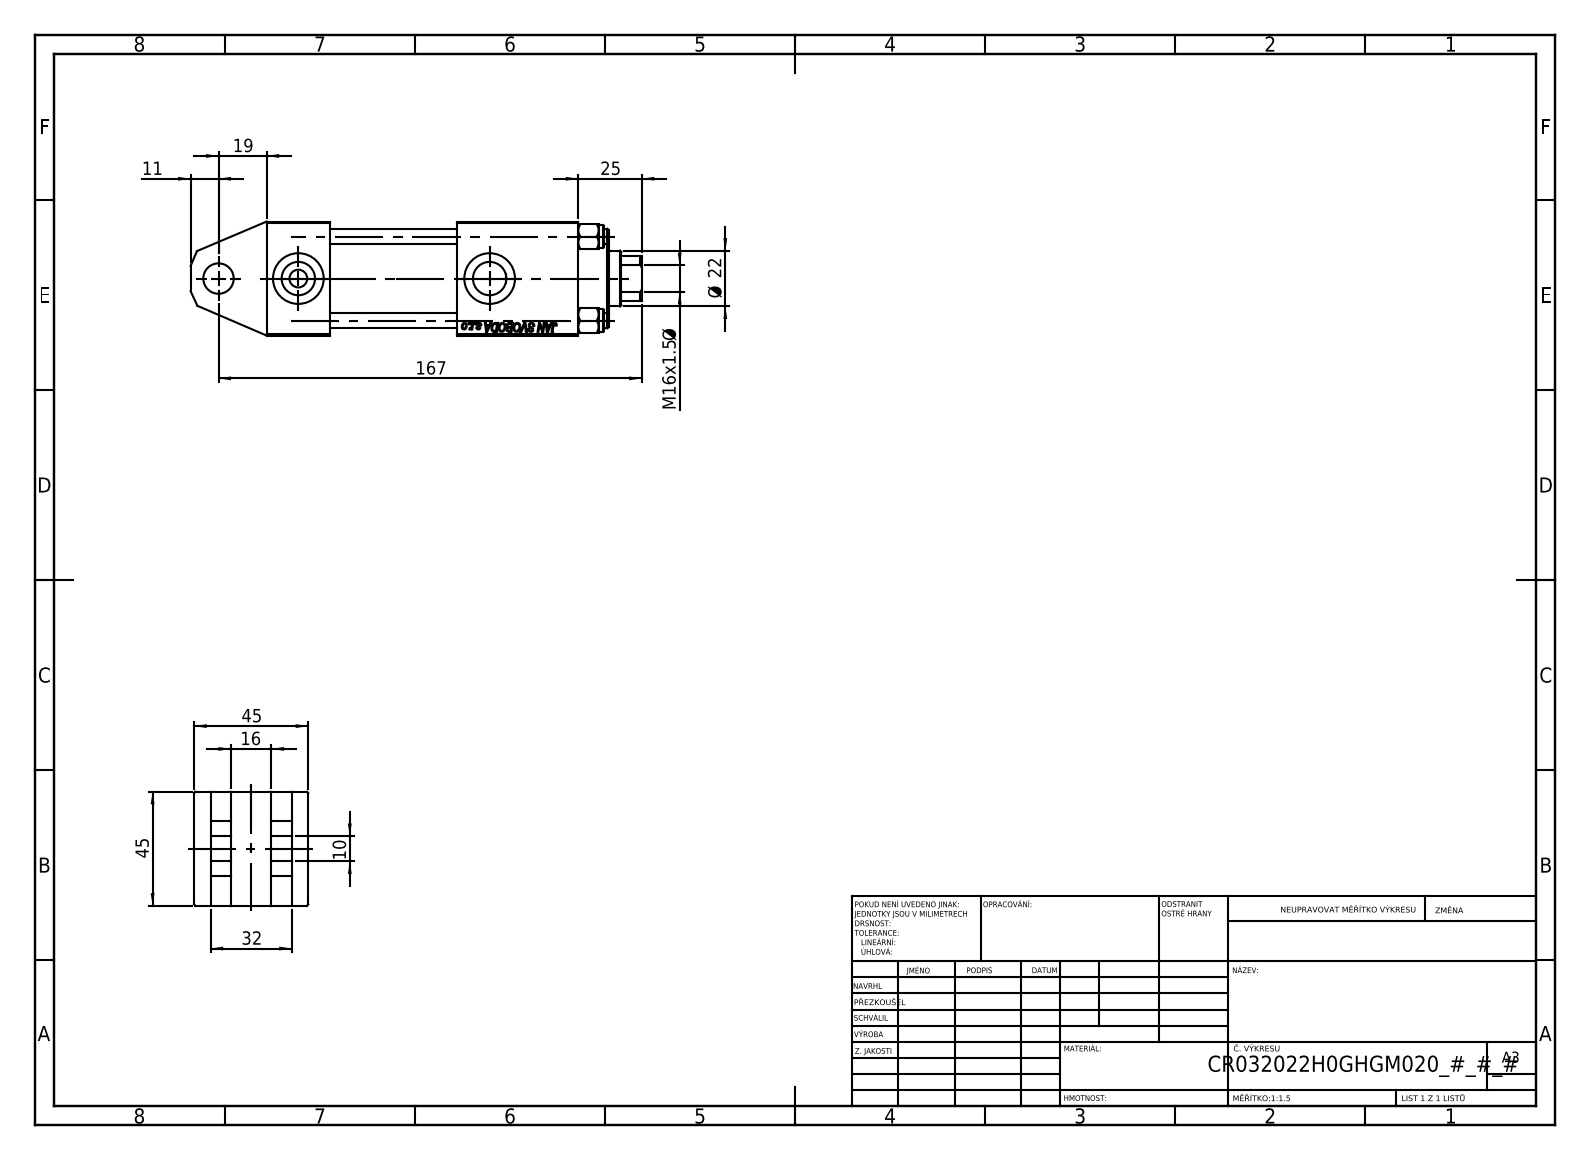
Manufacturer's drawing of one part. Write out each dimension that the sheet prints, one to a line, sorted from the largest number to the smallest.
167
45
45
32
25
Ø 22
19
M16x1.5 Ø
16
11
10
